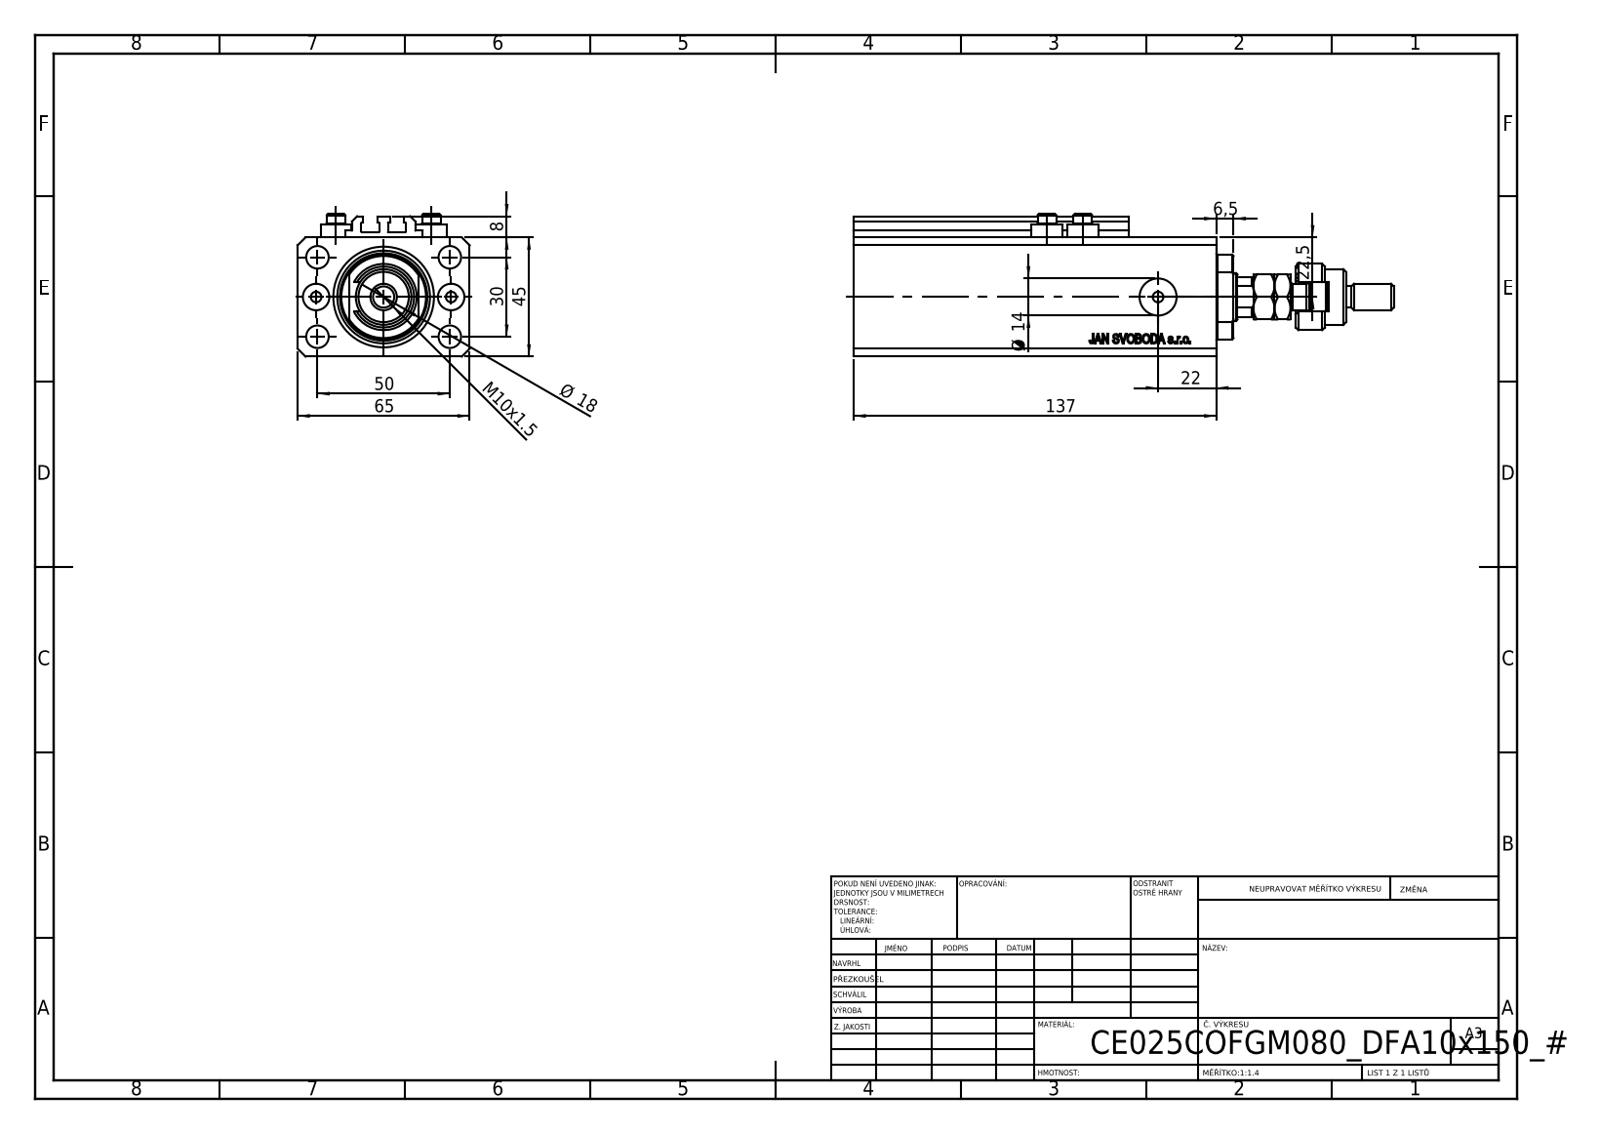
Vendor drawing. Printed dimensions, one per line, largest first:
137
65
50
45
30
22,5
22
Ø 18
Ø 14
M10x1.5
8
6,5
